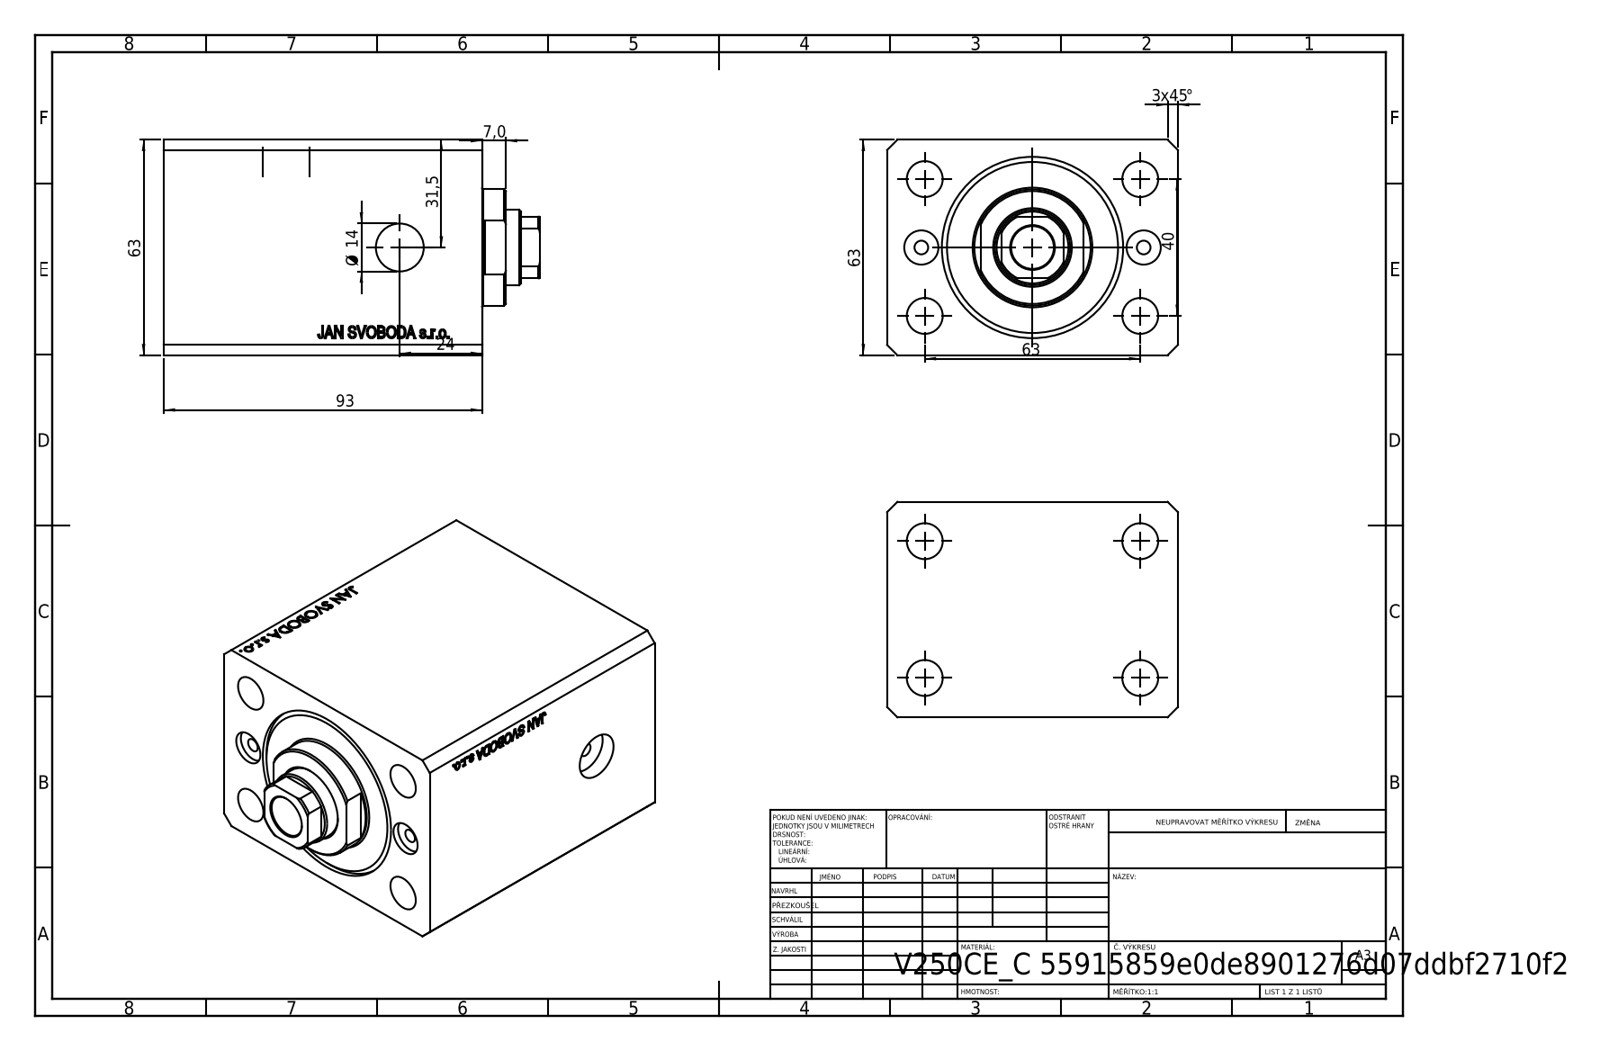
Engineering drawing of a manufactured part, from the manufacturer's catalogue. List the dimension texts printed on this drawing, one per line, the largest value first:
93
63
63
63
3 x45 °
40
31,5
24
Ø 14
7,0
